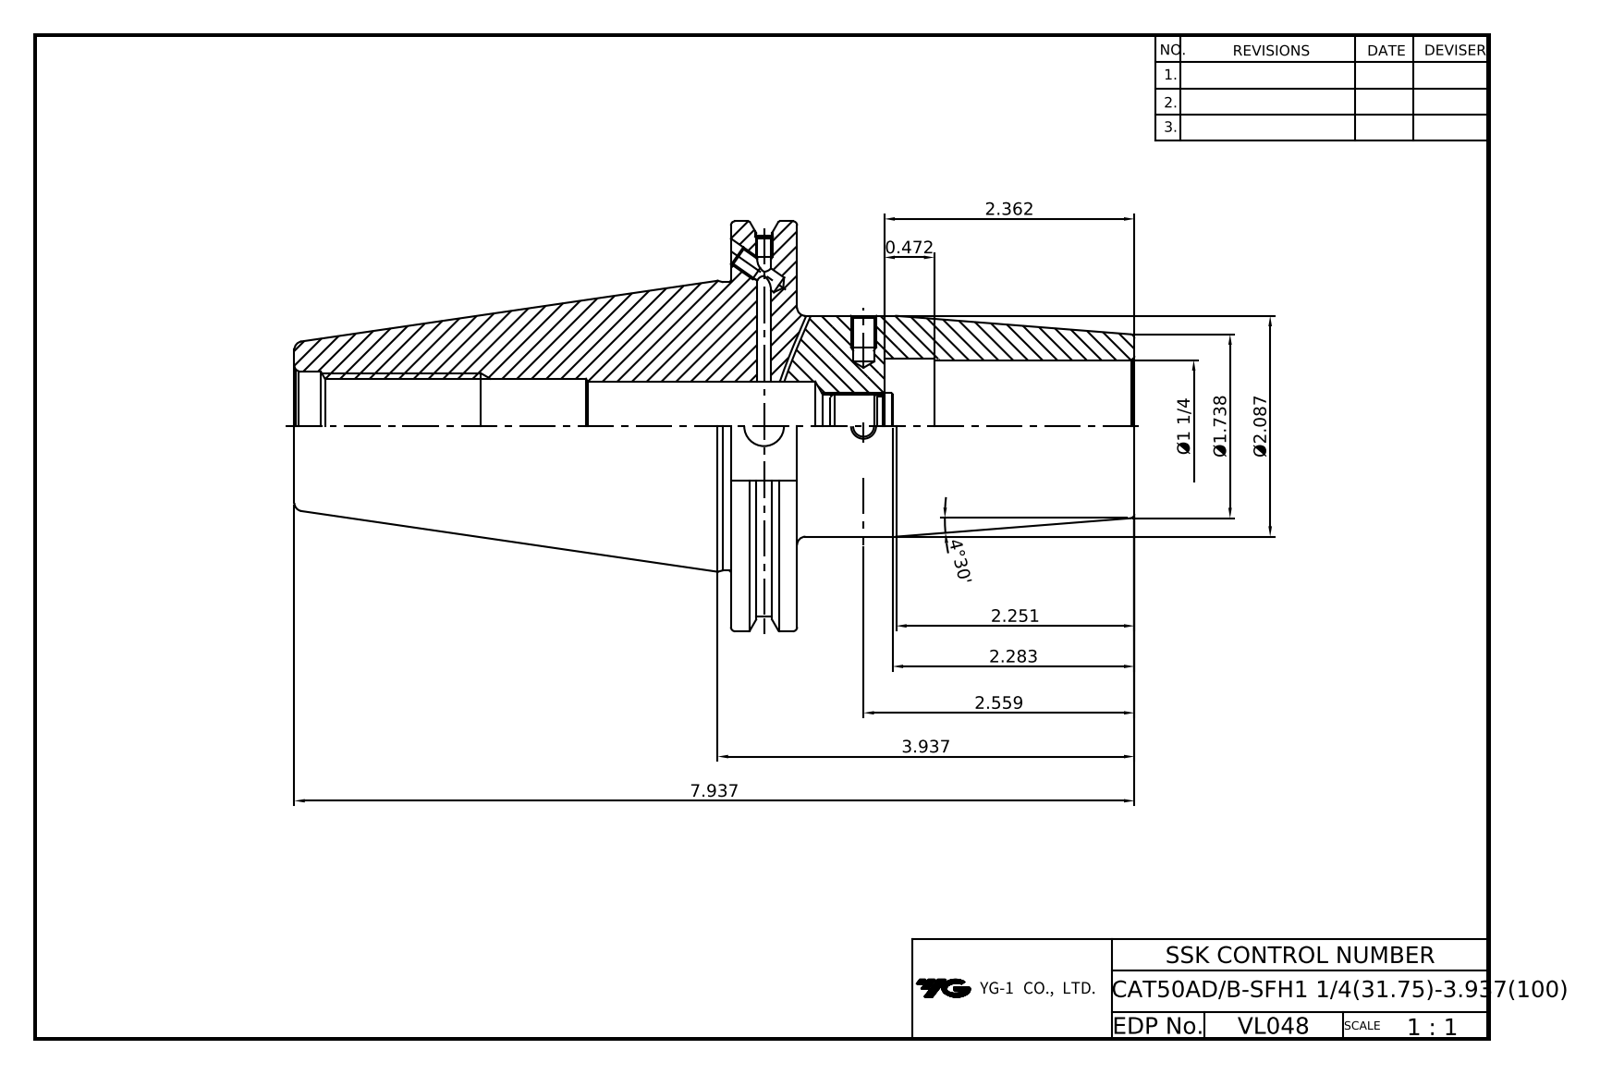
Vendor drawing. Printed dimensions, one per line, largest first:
7.937
4°30'
3.937
2.559
2.362
2.283
2.251
Ø2.087
Ø1.738
0.472
